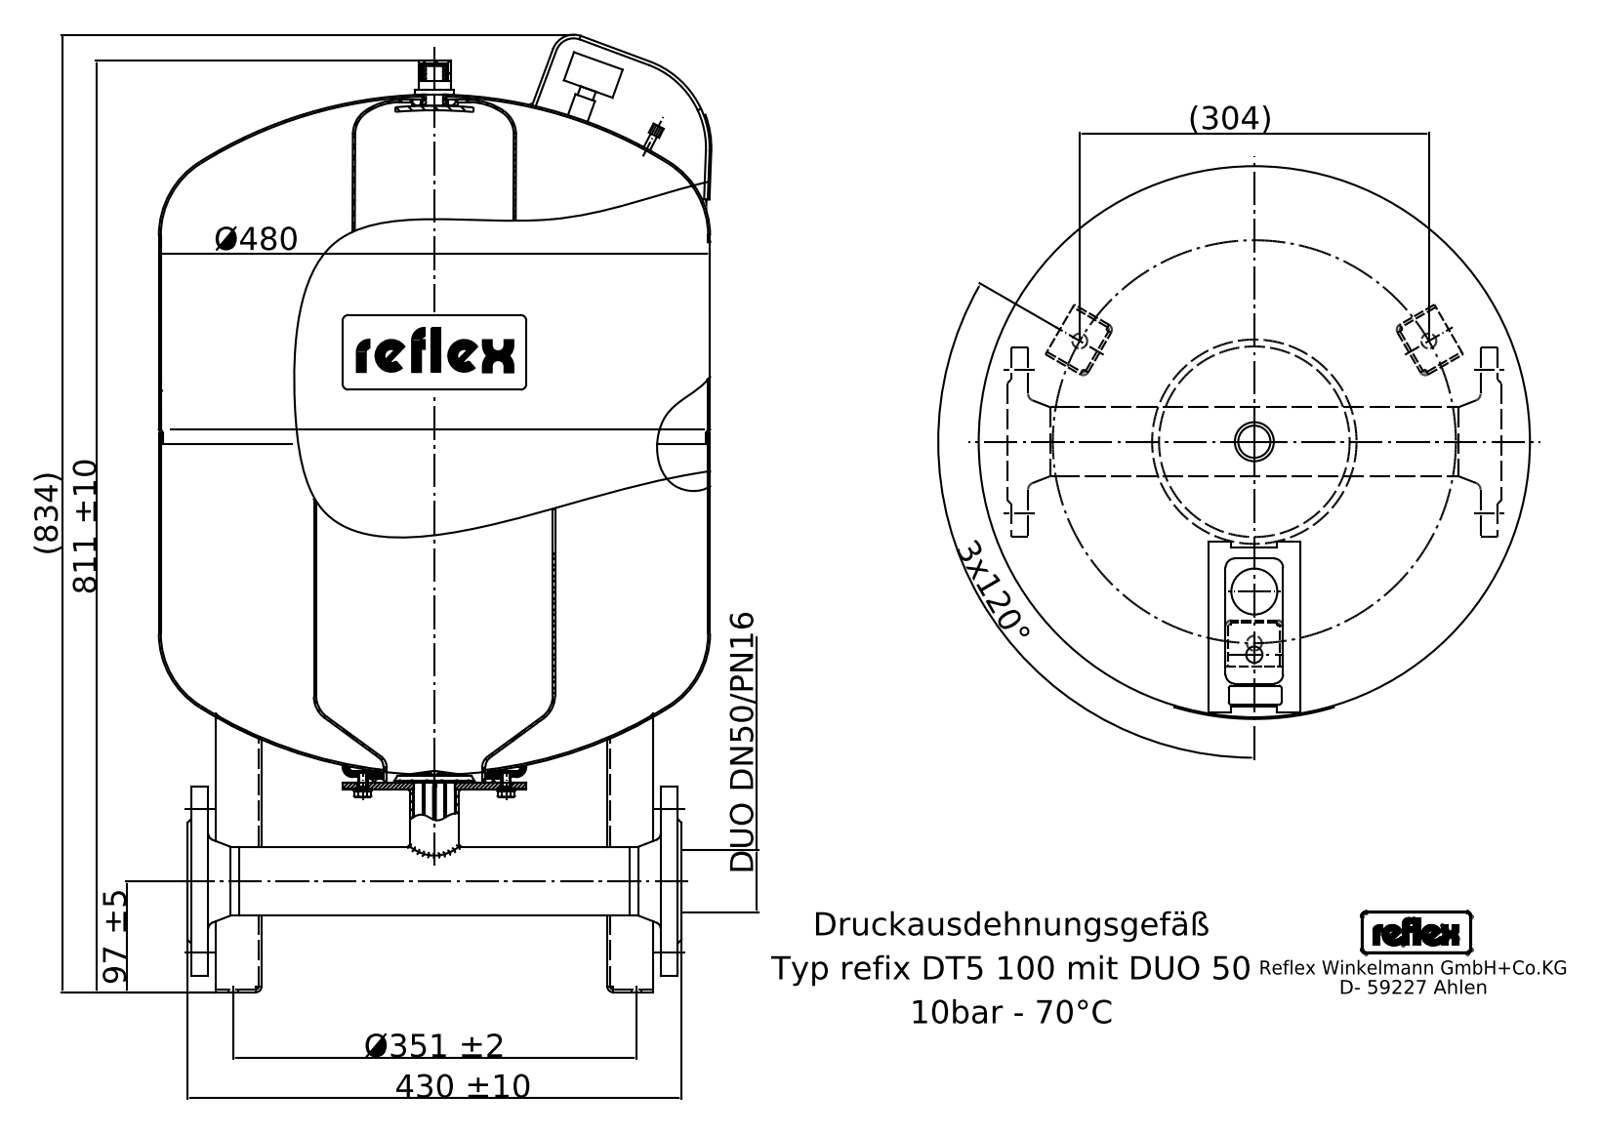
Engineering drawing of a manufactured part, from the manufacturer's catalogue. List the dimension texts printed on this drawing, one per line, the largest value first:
(834)
811 ±10
Ø480
430 ±10
Ø351 ±2
(304)
3x120°
97 ±5
DUO DN50/PN16
